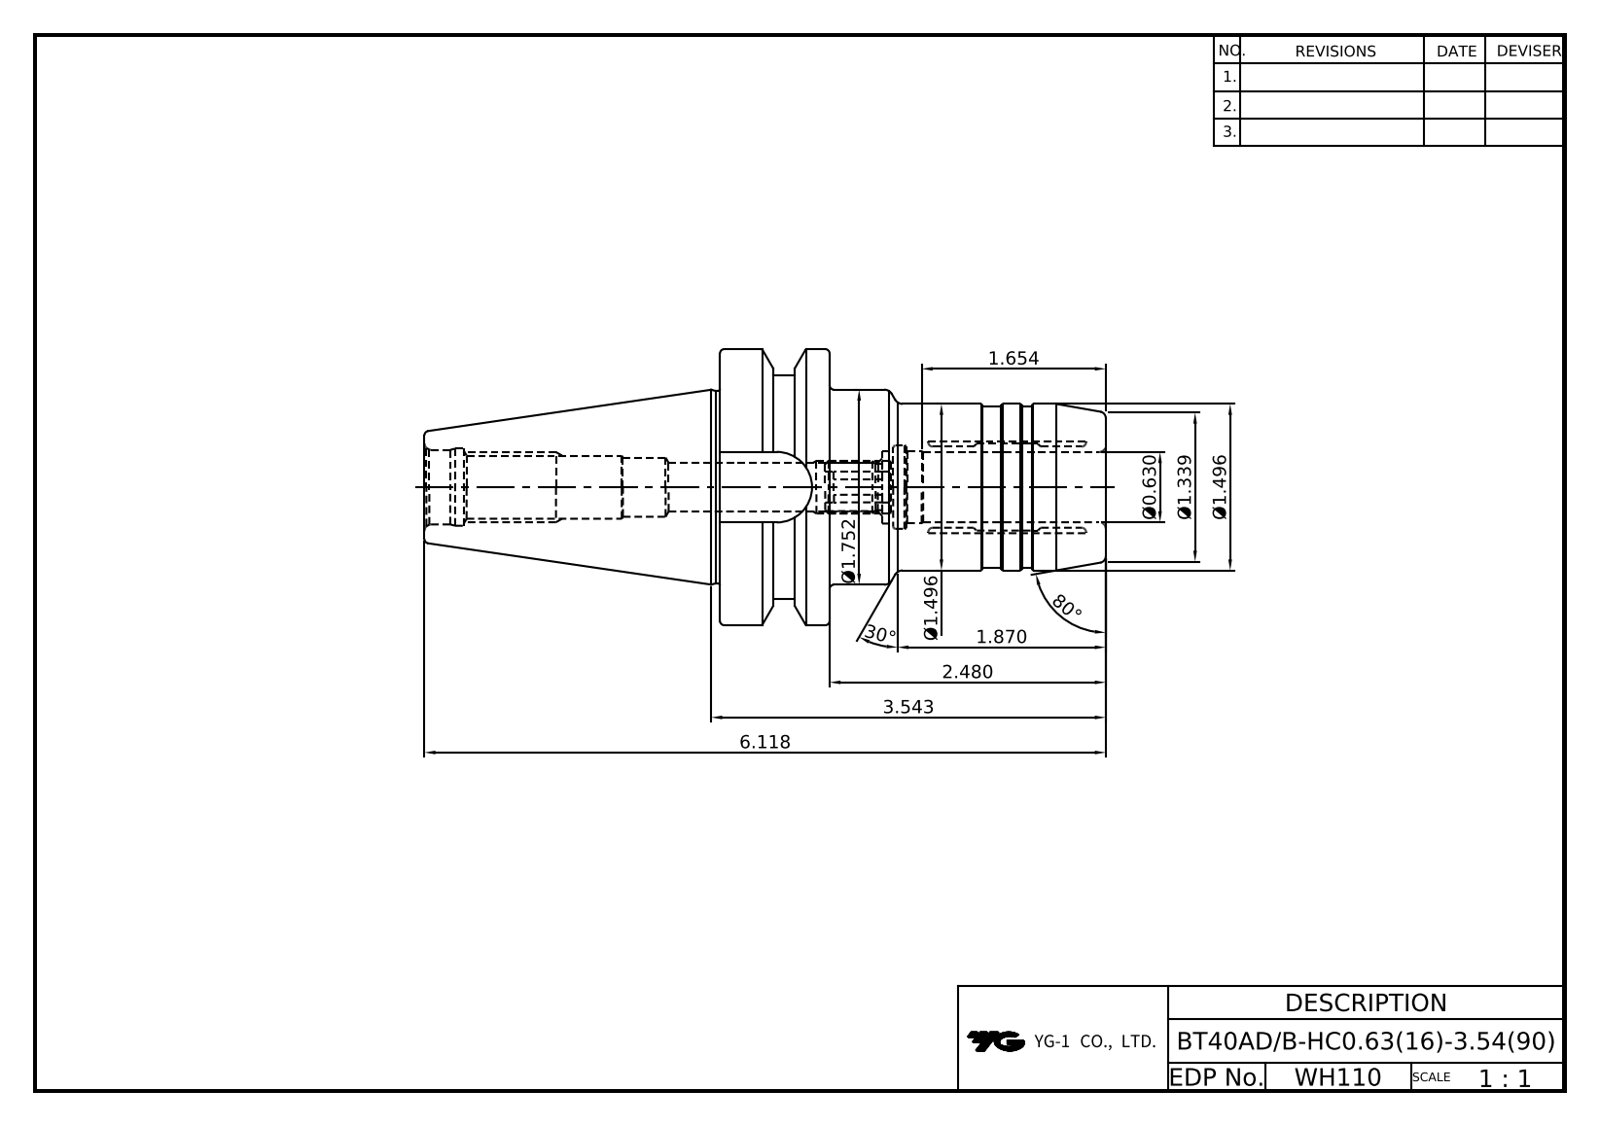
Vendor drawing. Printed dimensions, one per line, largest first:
80°
30°
6.118
3.543
2.480
1.870
Ø1.752
1.654
Ø1.496
Ø1.496
Ø1.339
Ø0.630
